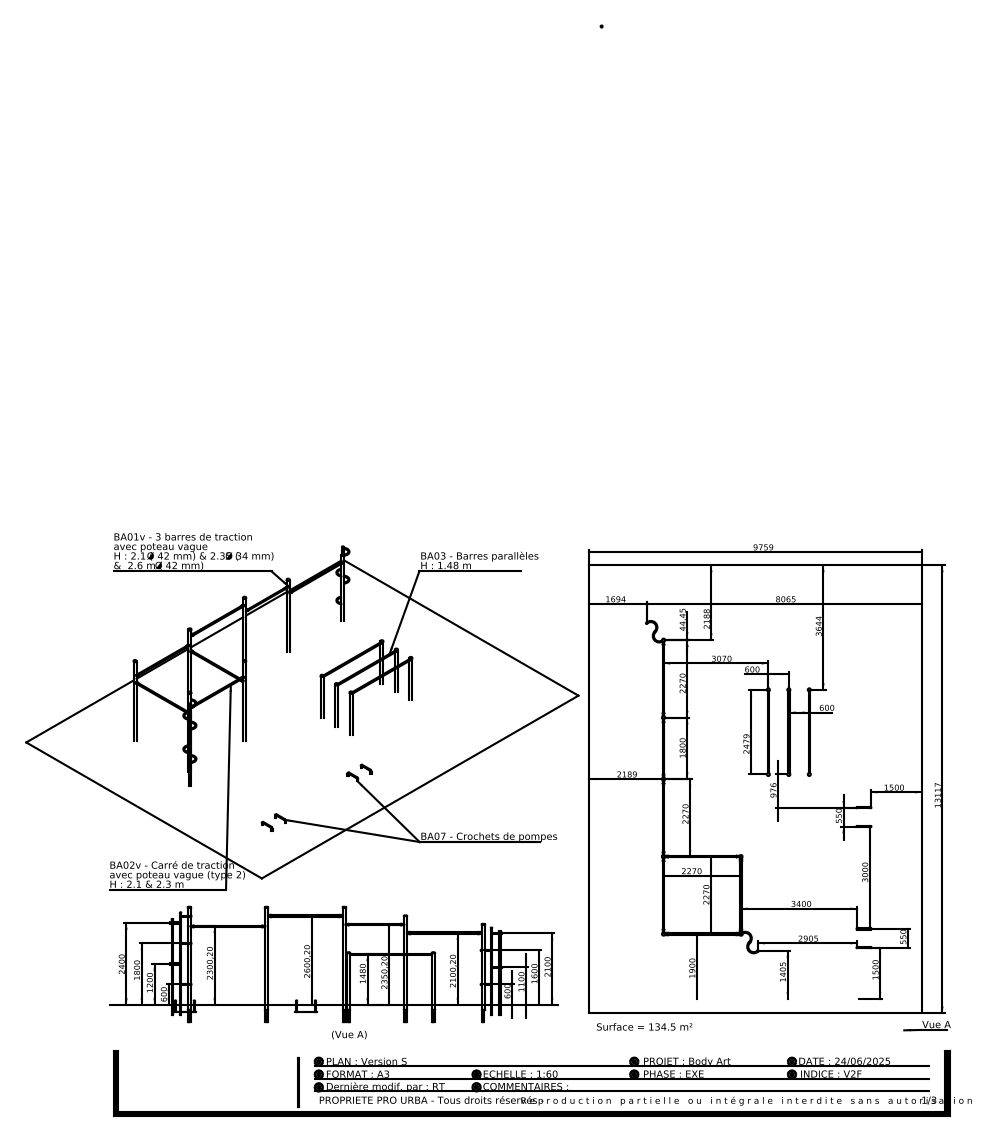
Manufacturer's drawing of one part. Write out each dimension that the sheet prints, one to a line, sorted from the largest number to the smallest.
13117
9759
8065
3644
3400
3070
3000
2905
2600,20
2479
2400
2350,20
2300,20
2270
2270
2270
2270
2189
2188
2100,20
2100
1900
1800
1800
1694
1600
1500
1500
1480
1405
1200
1100
976
600
600
600
600
550
550
44,45
